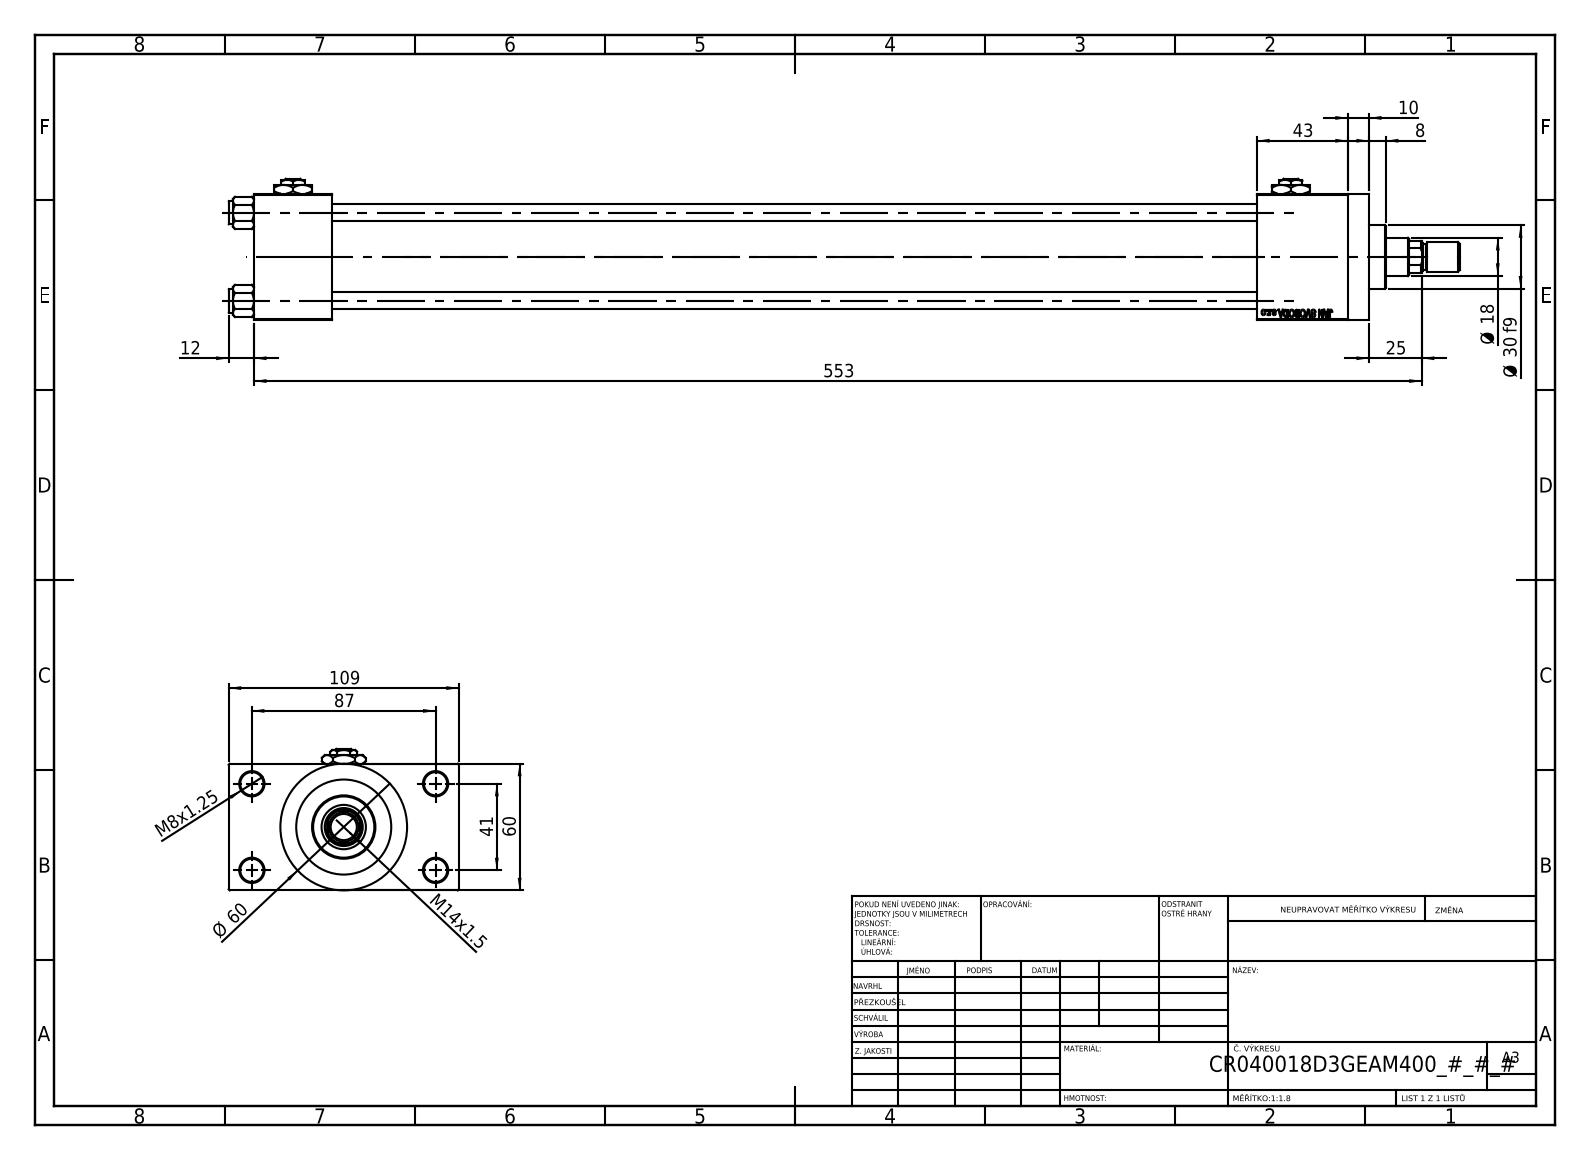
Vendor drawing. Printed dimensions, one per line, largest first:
553
109
87
Ø 60
60
43
41
Ø 30 f9
25
Ø 18
M14x1.5
12
10
8
M8x1.25
